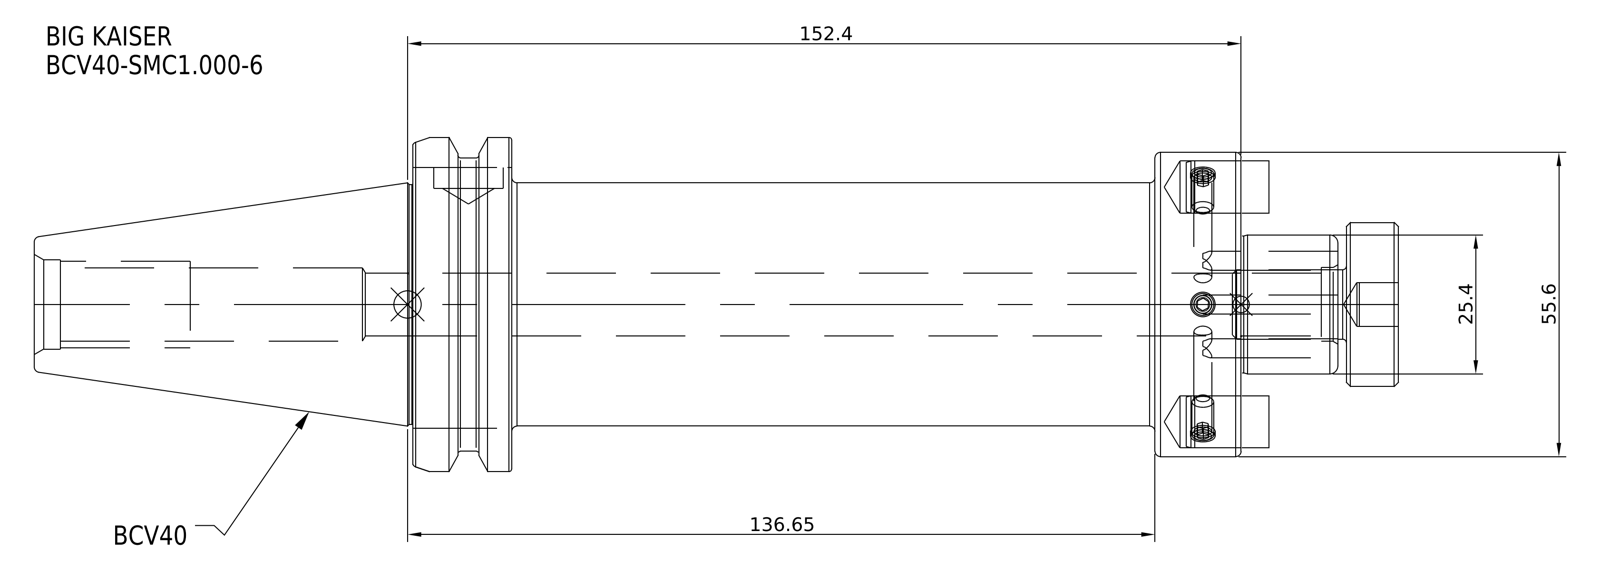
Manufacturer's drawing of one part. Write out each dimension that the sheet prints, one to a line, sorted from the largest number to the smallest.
152.4
136.65
55.6
25.4
